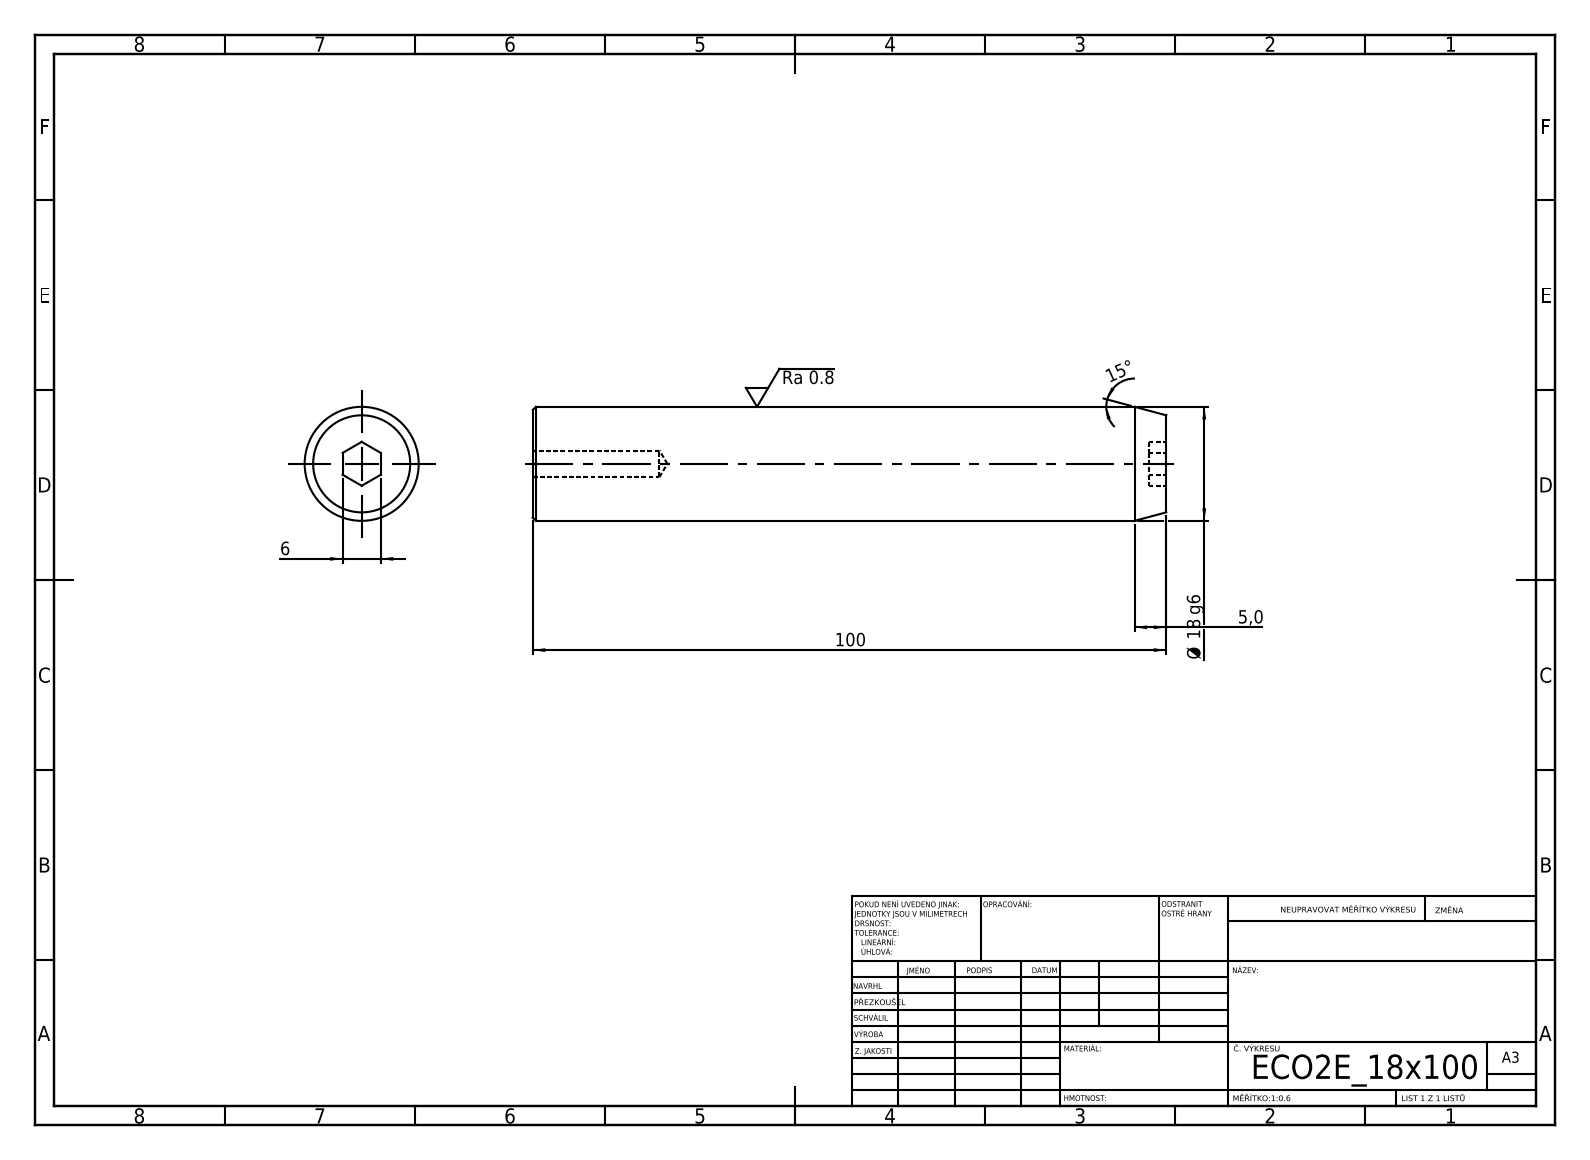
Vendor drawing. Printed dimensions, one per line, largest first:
100
Ø 18 g6
15°
6
5,0
